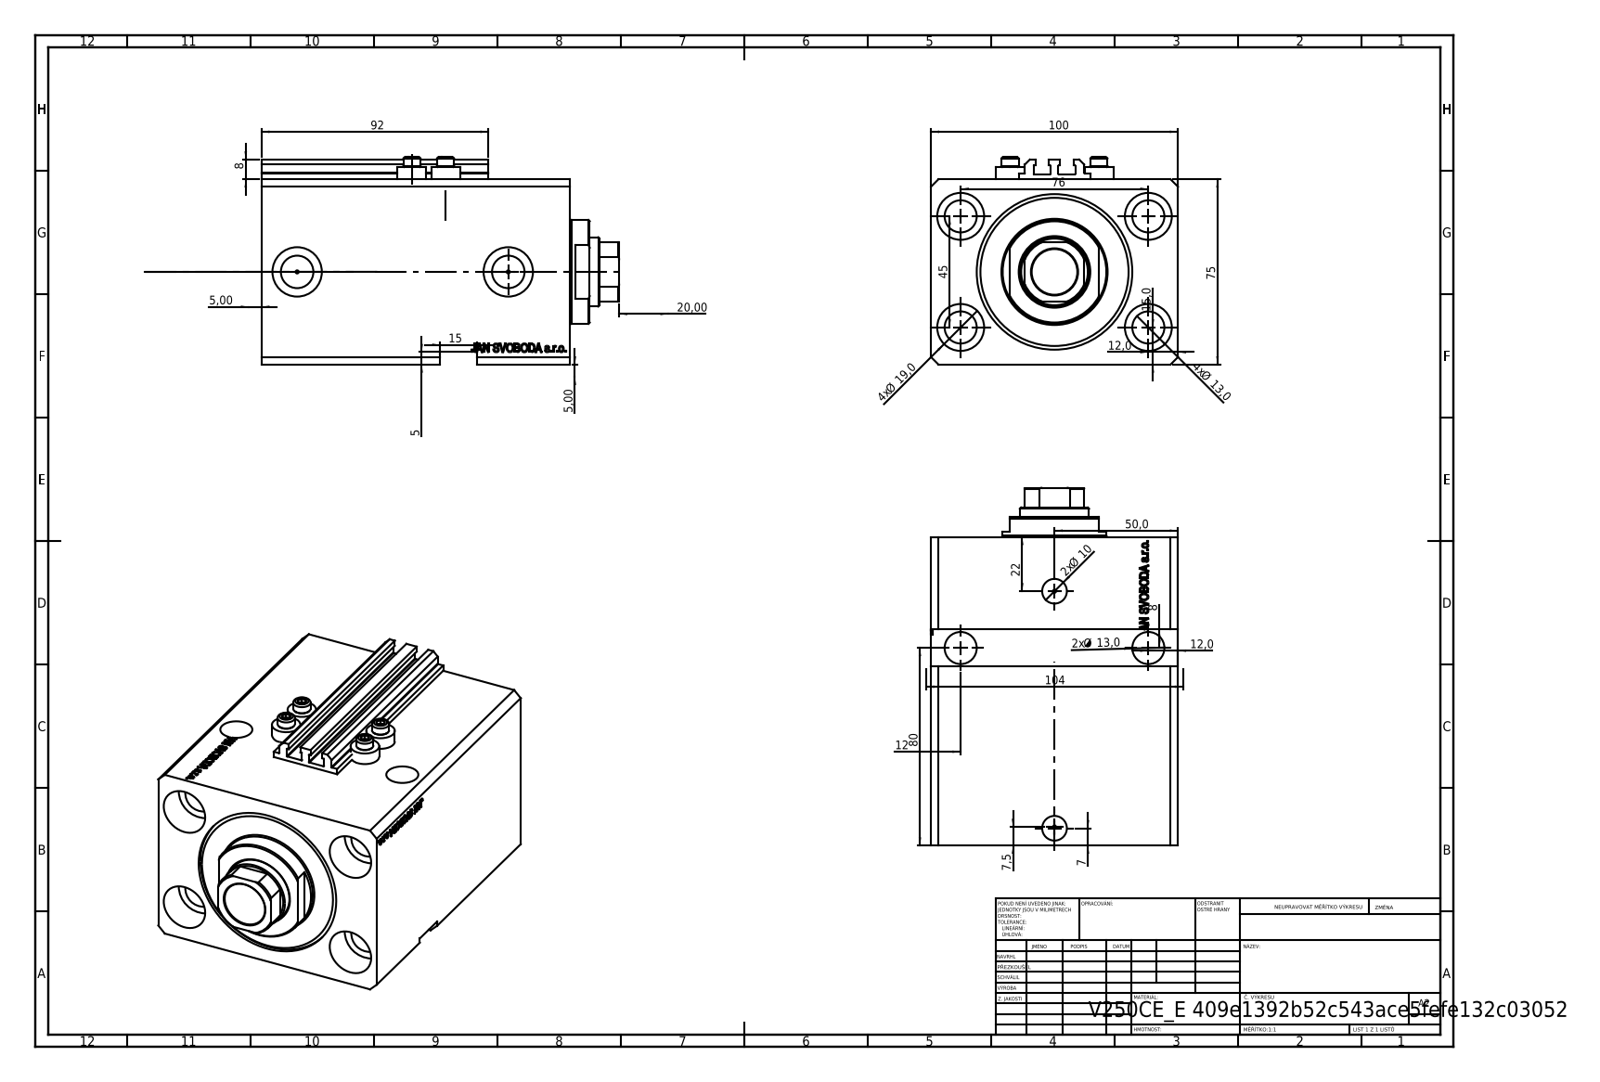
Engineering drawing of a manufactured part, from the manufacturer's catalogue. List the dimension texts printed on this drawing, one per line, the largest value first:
104
100
92
80
76
75
50,0
45
22
20,00
4x Ø 19,0
15,0
15
4x Ø 13,0
2x Ø 13,0
12,0
12,0
12
2x Ø 10
8
8
7,5
7
5,00
5,00
5
